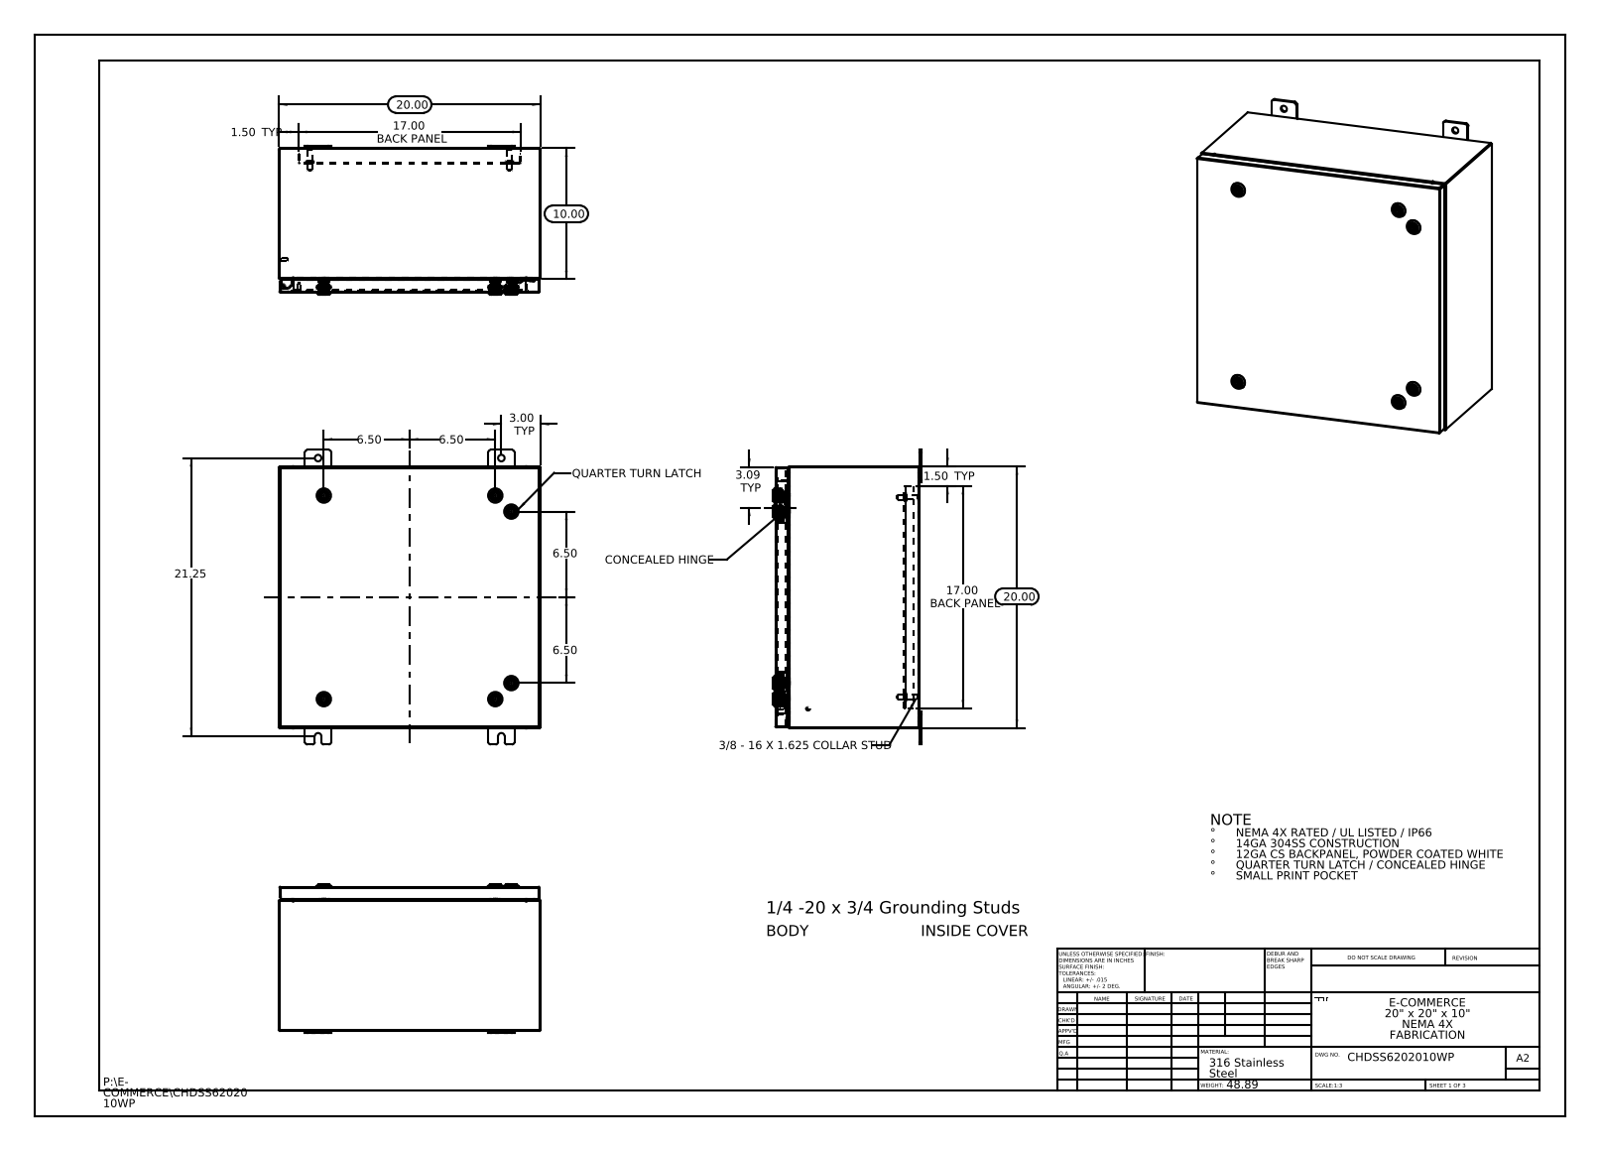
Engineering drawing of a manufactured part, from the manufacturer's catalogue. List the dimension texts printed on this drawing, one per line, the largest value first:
21.25
20.00
20.00
17.00 BACK PANEL
17.00 BACK PANEL
10.00
6.50
6.50
6.50
6.50
3.09 TYP
3.00 TYP
1.50 TYP
1.50 TYP
